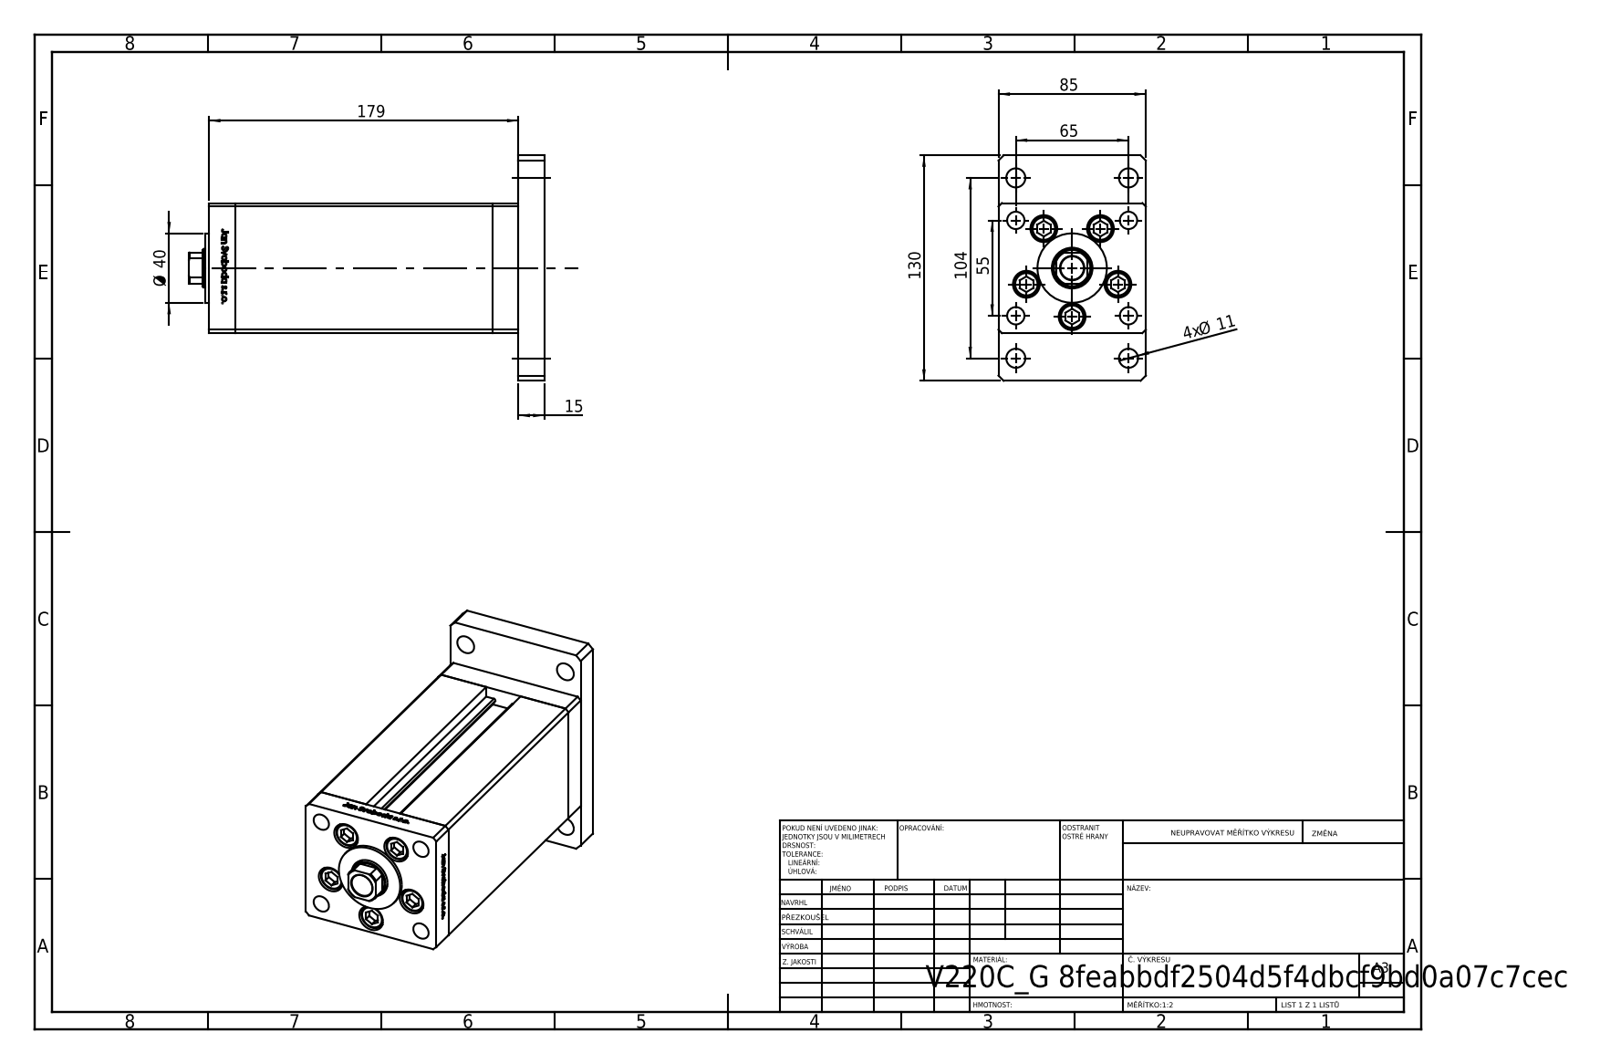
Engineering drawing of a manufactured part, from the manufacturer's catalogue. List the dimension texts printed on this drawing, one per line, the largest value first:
179
130
104
85
65
55
Ø 40
15
4x Ø 11
